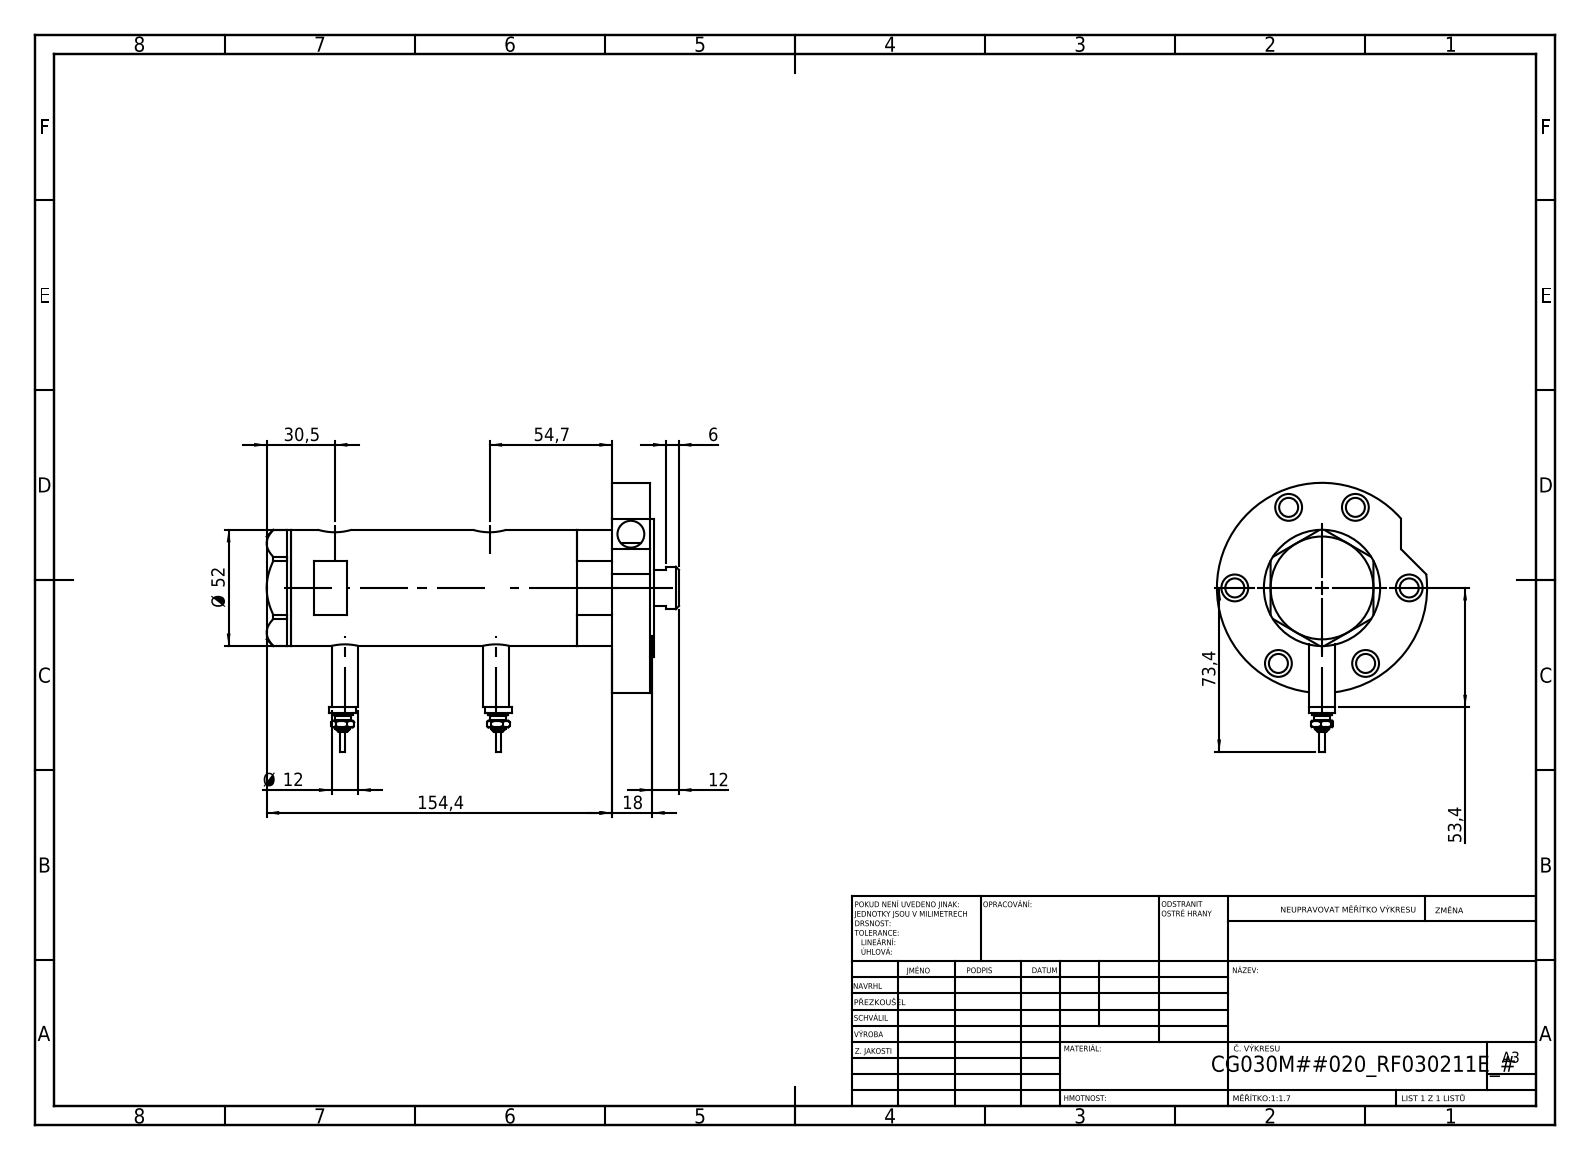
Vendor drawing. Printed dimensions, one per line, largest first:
154,4
73,4
54,7
53,4
Ø 52
30,5
18
12
Ø 12
6
